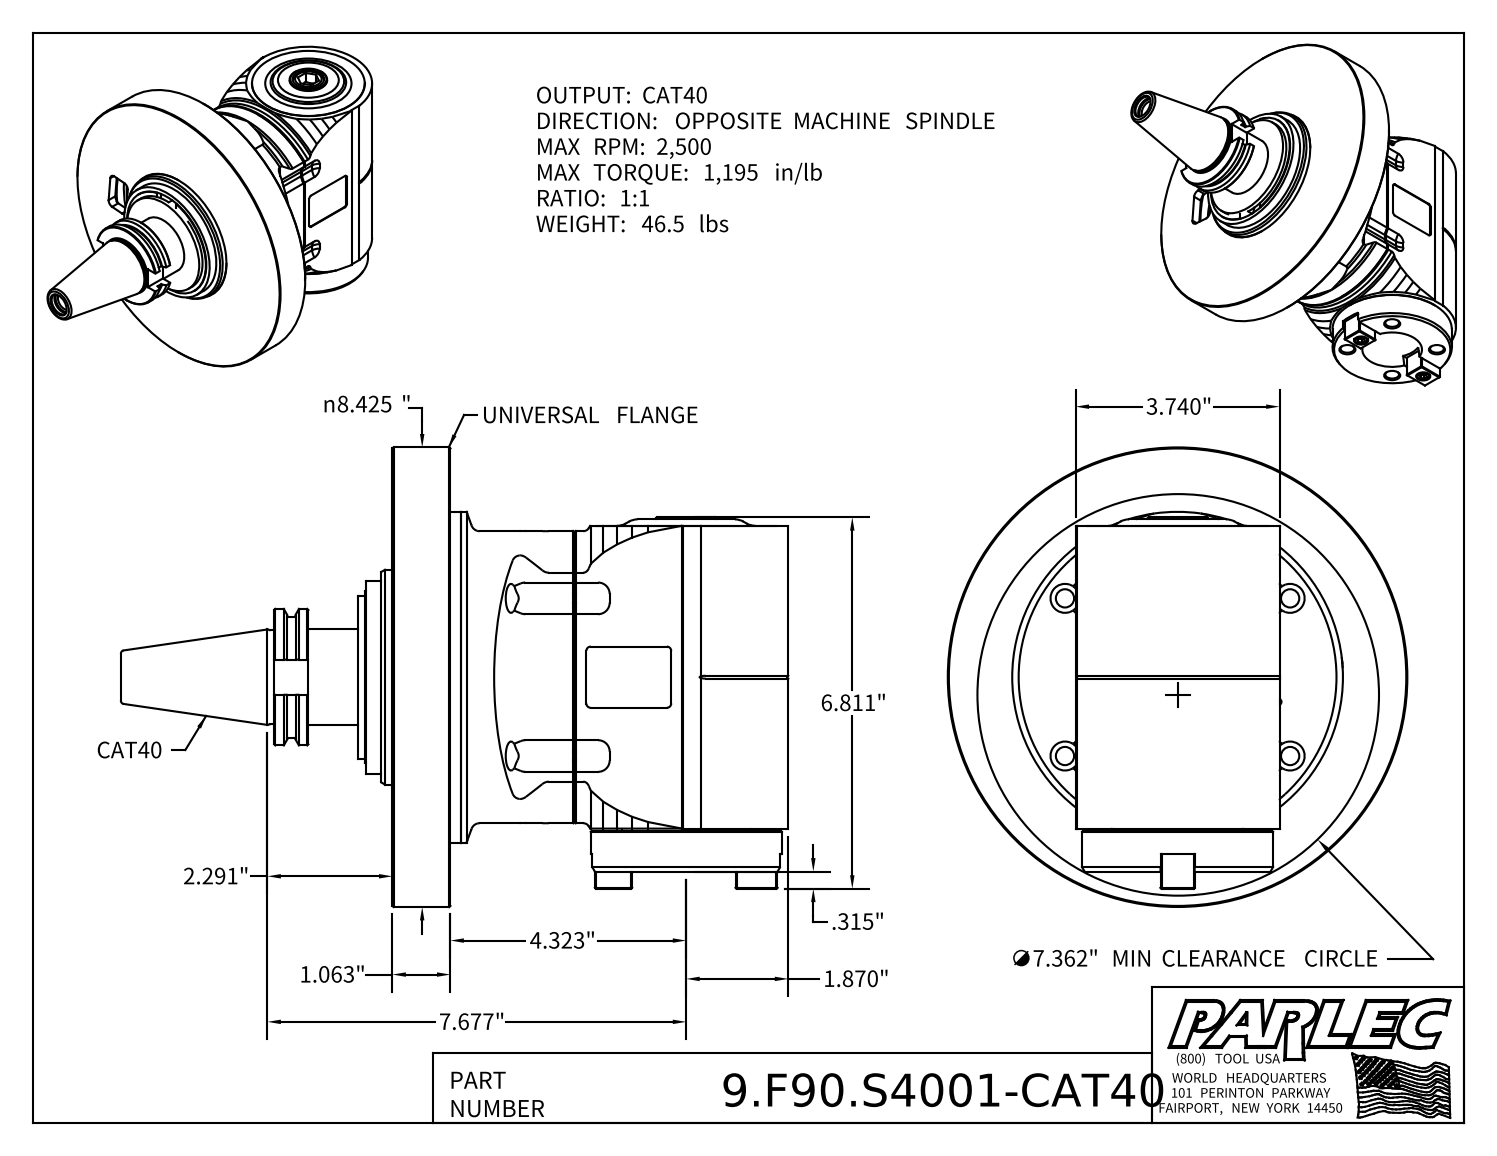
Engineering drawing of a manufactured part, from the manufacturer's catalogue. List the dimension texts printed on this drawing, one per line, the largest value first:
n8.425"
7.677"
∅7.362" MIN CLEARANCE CIRCLE
6.811"
4.323"
3.740"
2.291"
1.870"
1.063"
.315"
